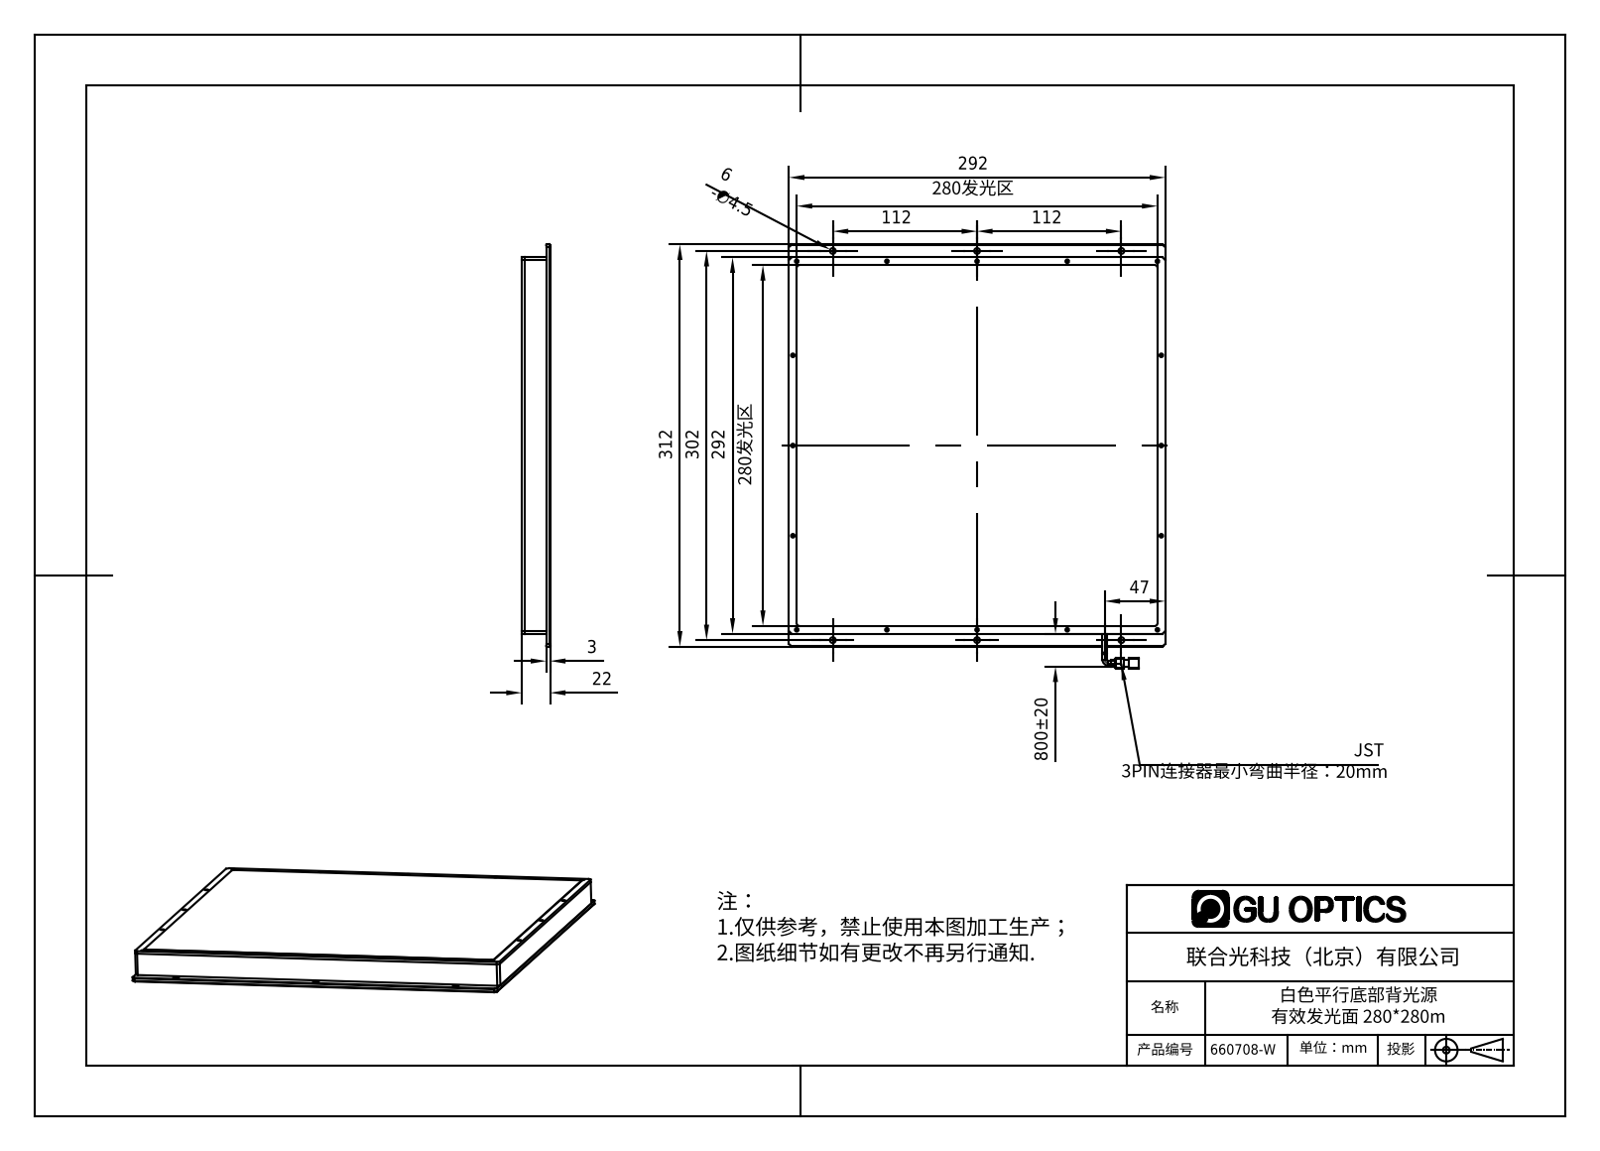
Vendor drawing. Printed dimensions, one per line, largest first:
800±20
312
302
292
292
280发光区
280发光区
112
112
47
22
6 -∅4.5
3
